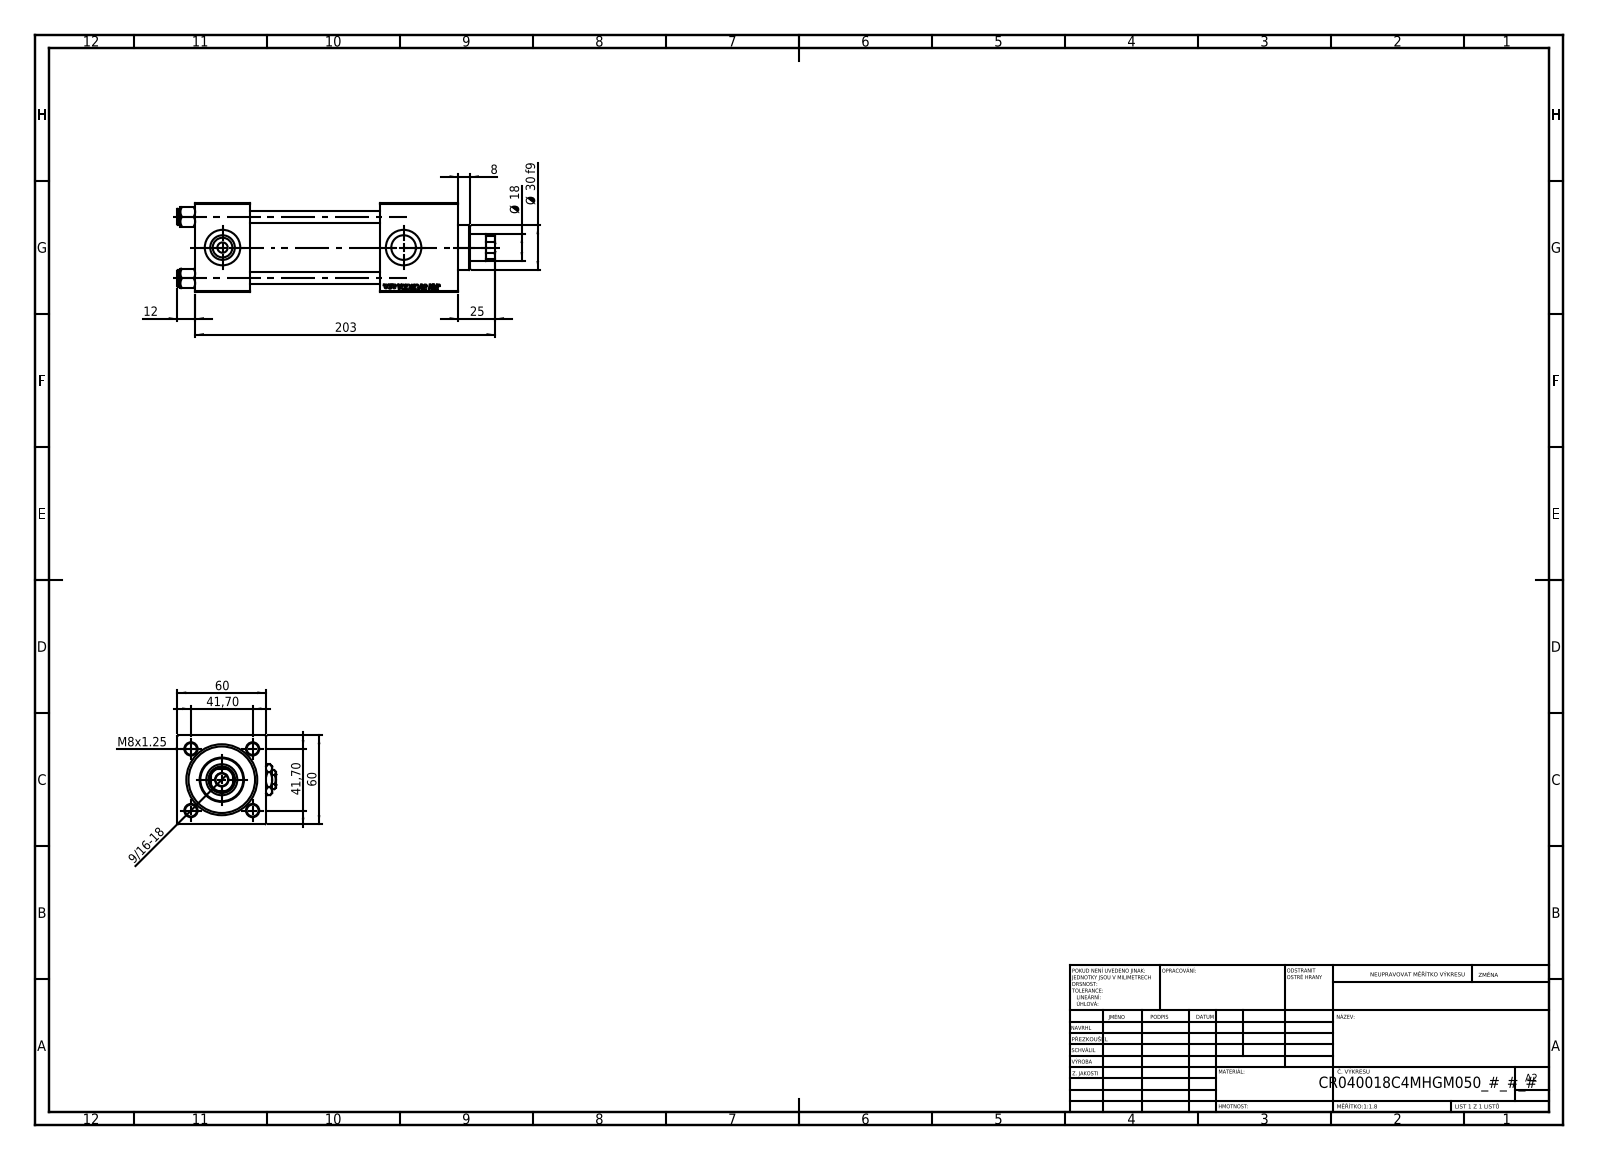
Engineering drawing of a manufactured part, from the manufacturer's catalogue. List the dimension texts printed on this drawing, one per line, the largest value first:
203
60
60
41,70
41,70
Ø 30 f9
25
Ø 18
12
8
M8x1.25
9/16-18
